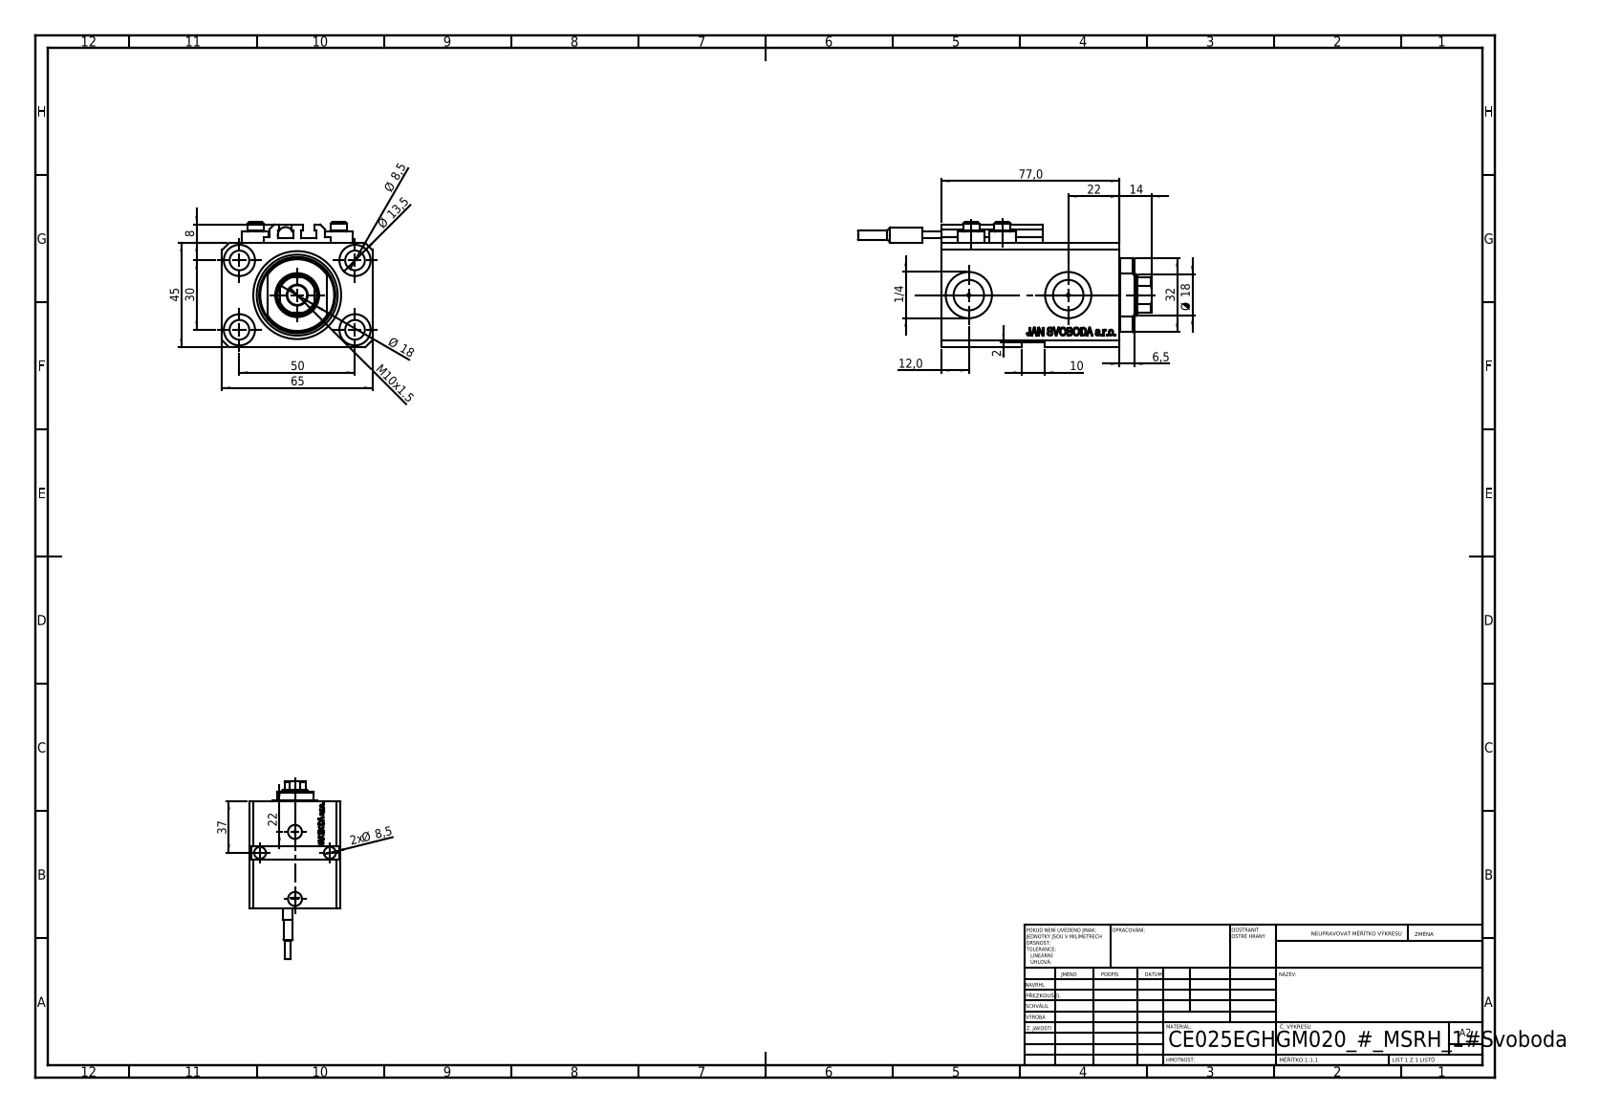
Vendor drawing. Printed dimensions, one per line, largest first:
77,0
65
50
45
37
32
30
22
22
Ø 18
Ø 18
14
Ø 13,5
12,0
M10x1.5
10
Ø 8,5
2x Ø 8,5
8
6,5
2
1/4
